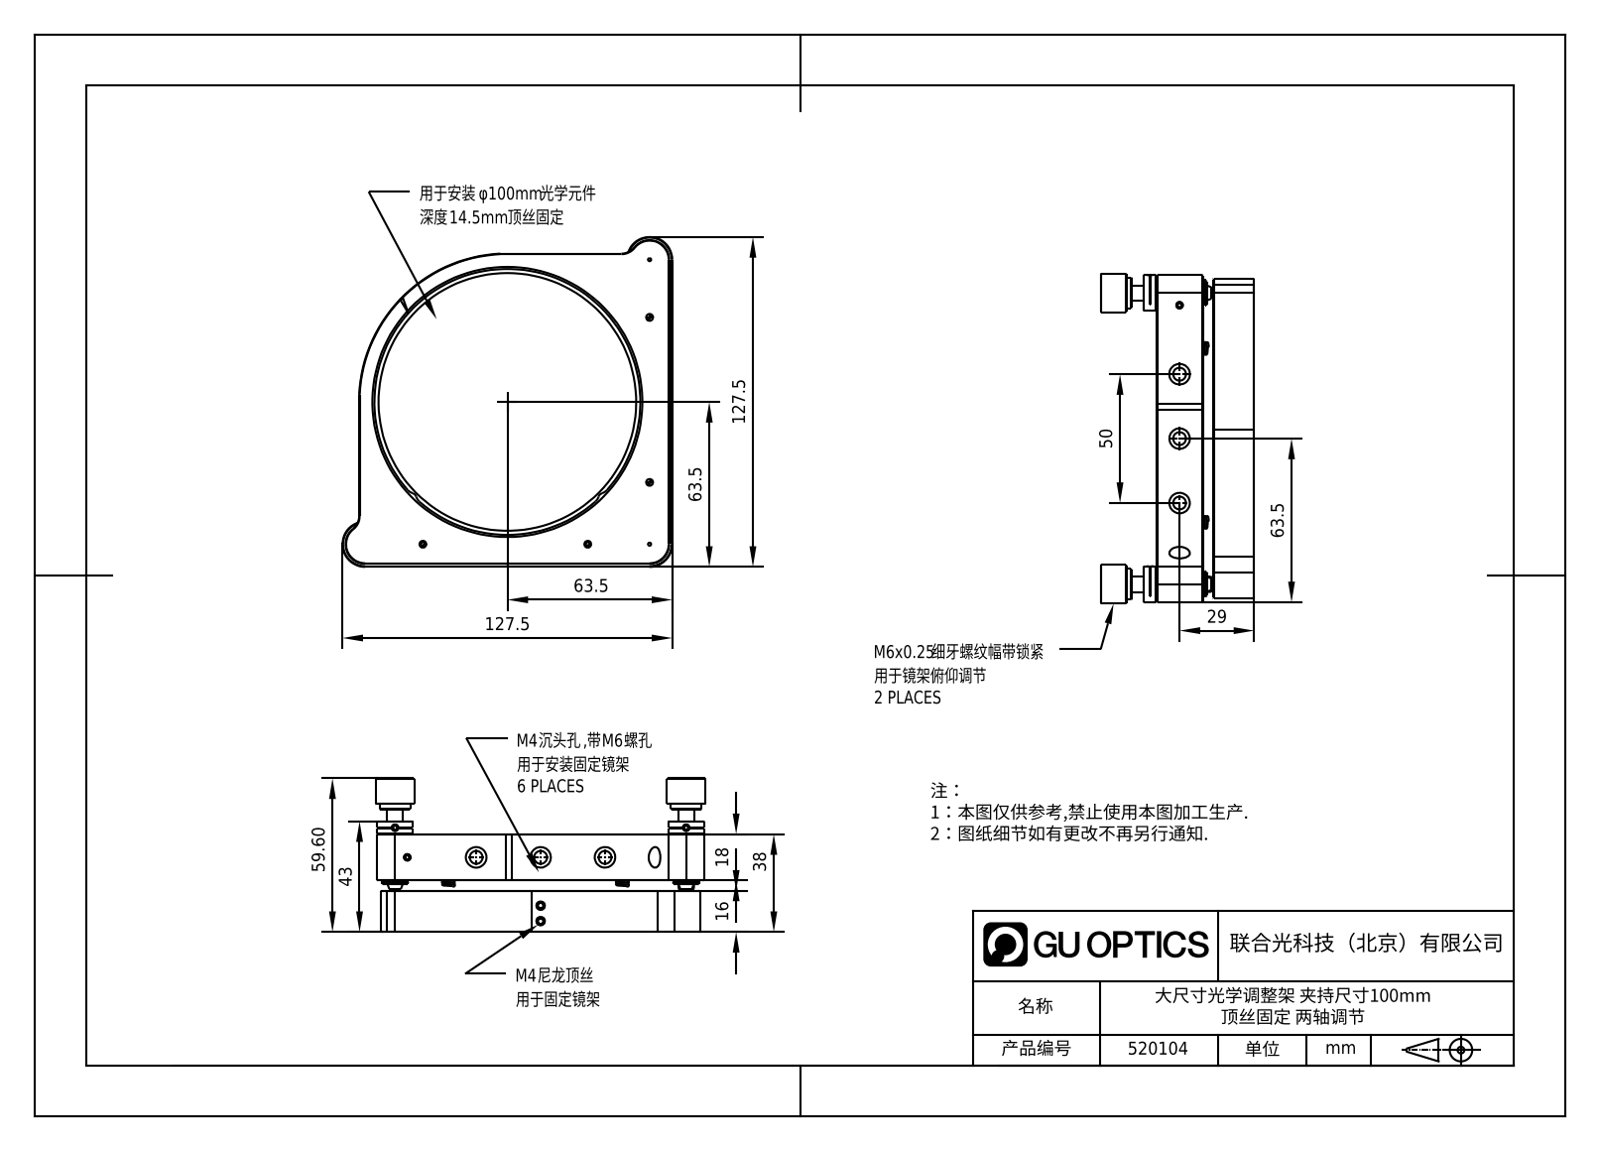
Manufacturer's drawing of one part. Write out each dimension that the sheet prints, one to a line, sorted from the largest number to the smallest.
127.5
127.5
63.5
63.5
63.5
59.60
50
43
38
29
18
16
